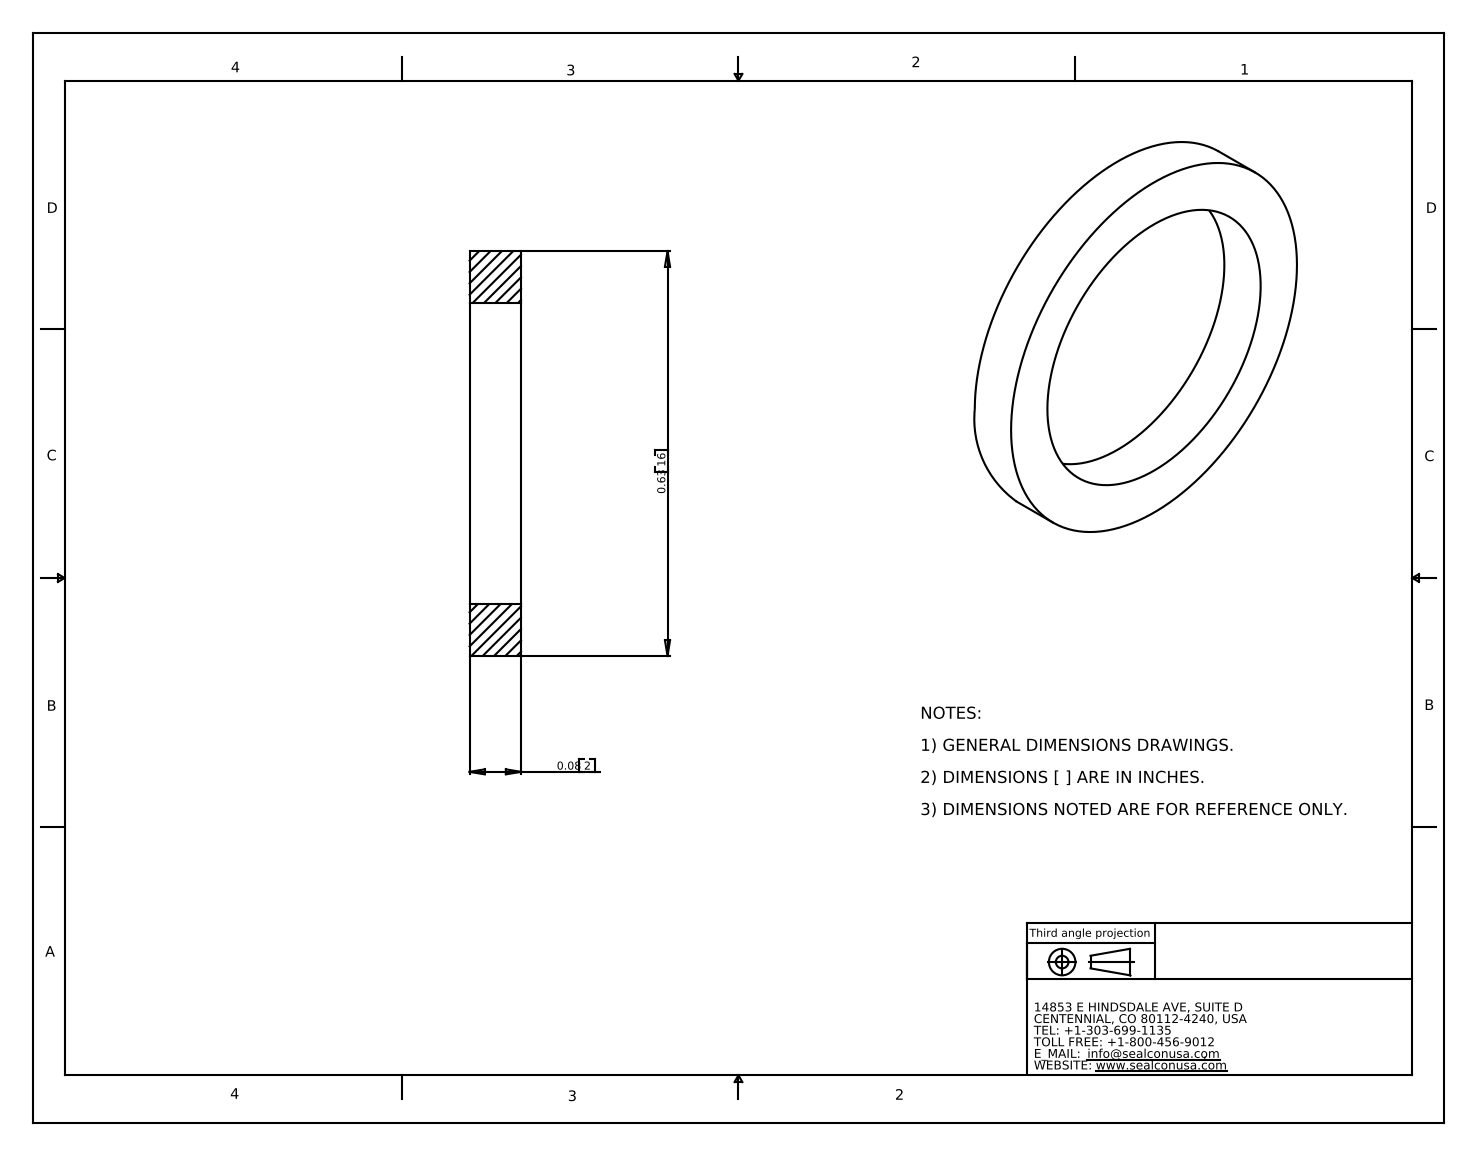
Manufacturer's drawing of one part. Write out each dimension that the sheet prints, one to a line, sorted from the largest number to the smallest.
0.63 16
0.08 2
